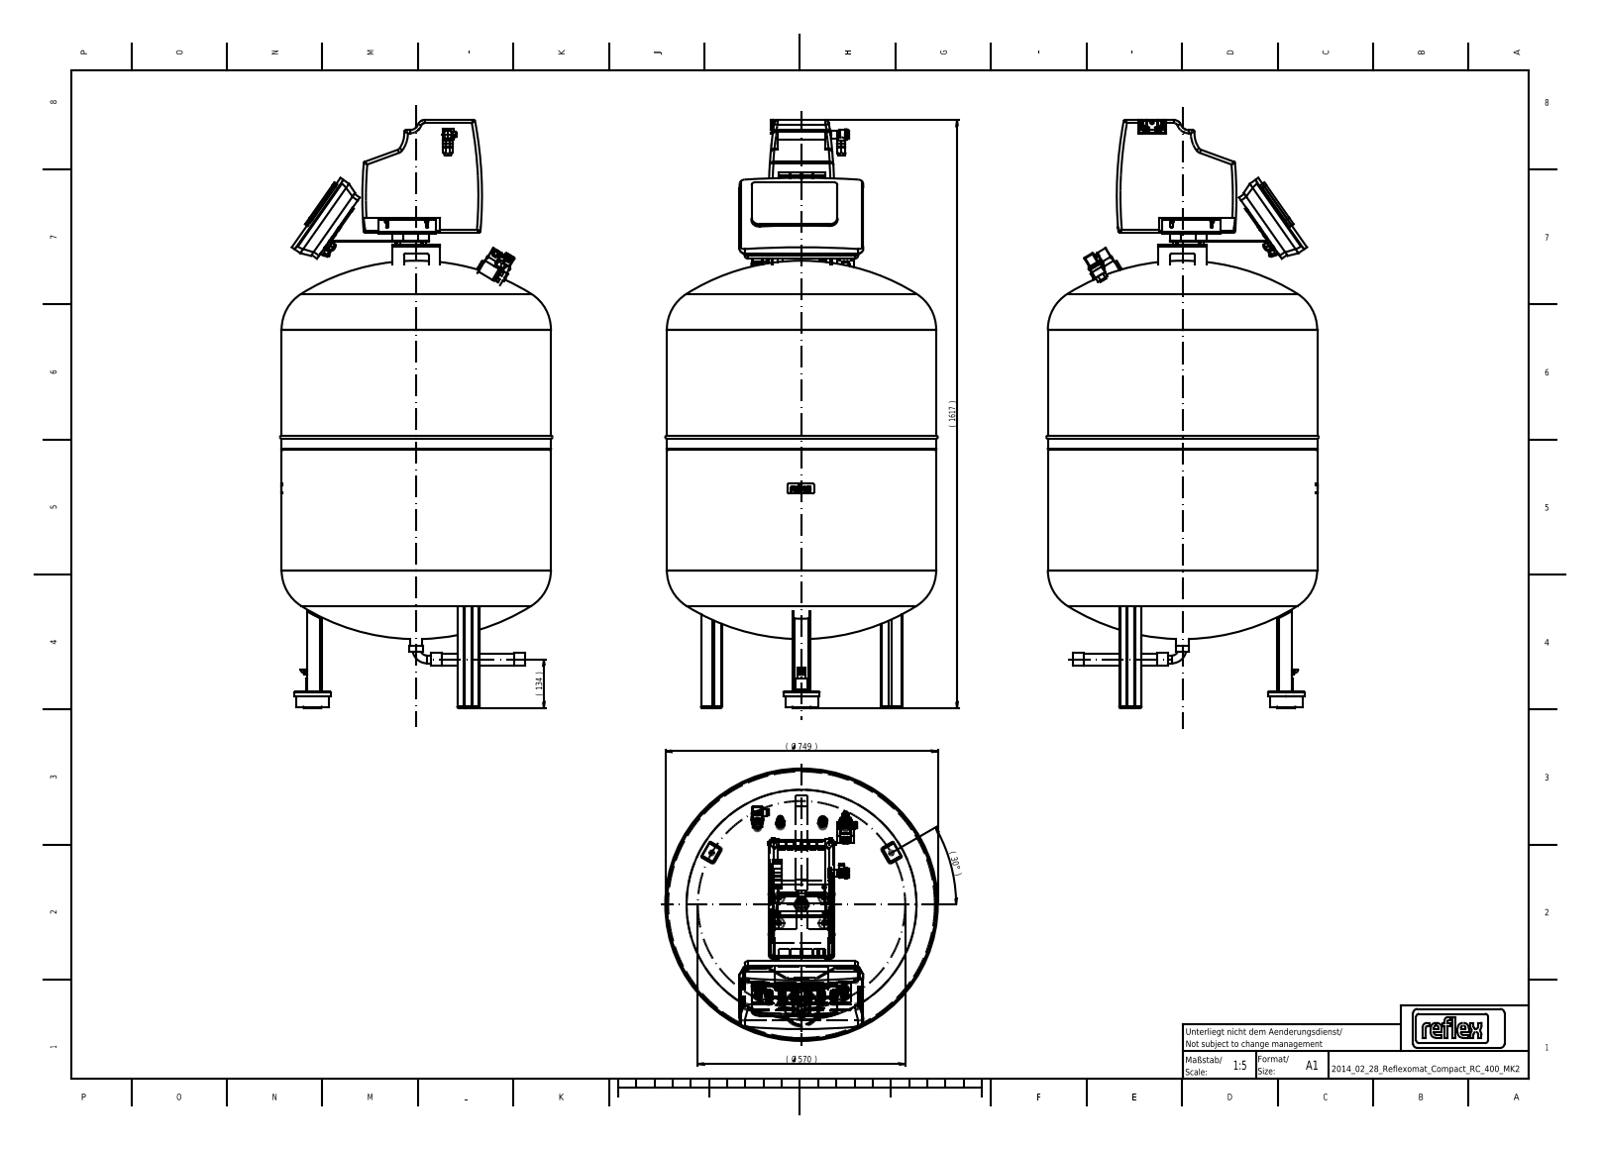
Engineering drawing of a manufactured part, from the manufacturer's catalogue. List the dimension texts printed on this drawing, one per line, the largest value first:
1617 ( )
749 Ø ( )
570 Ø ( )
134 ( )
30 ° ( )
